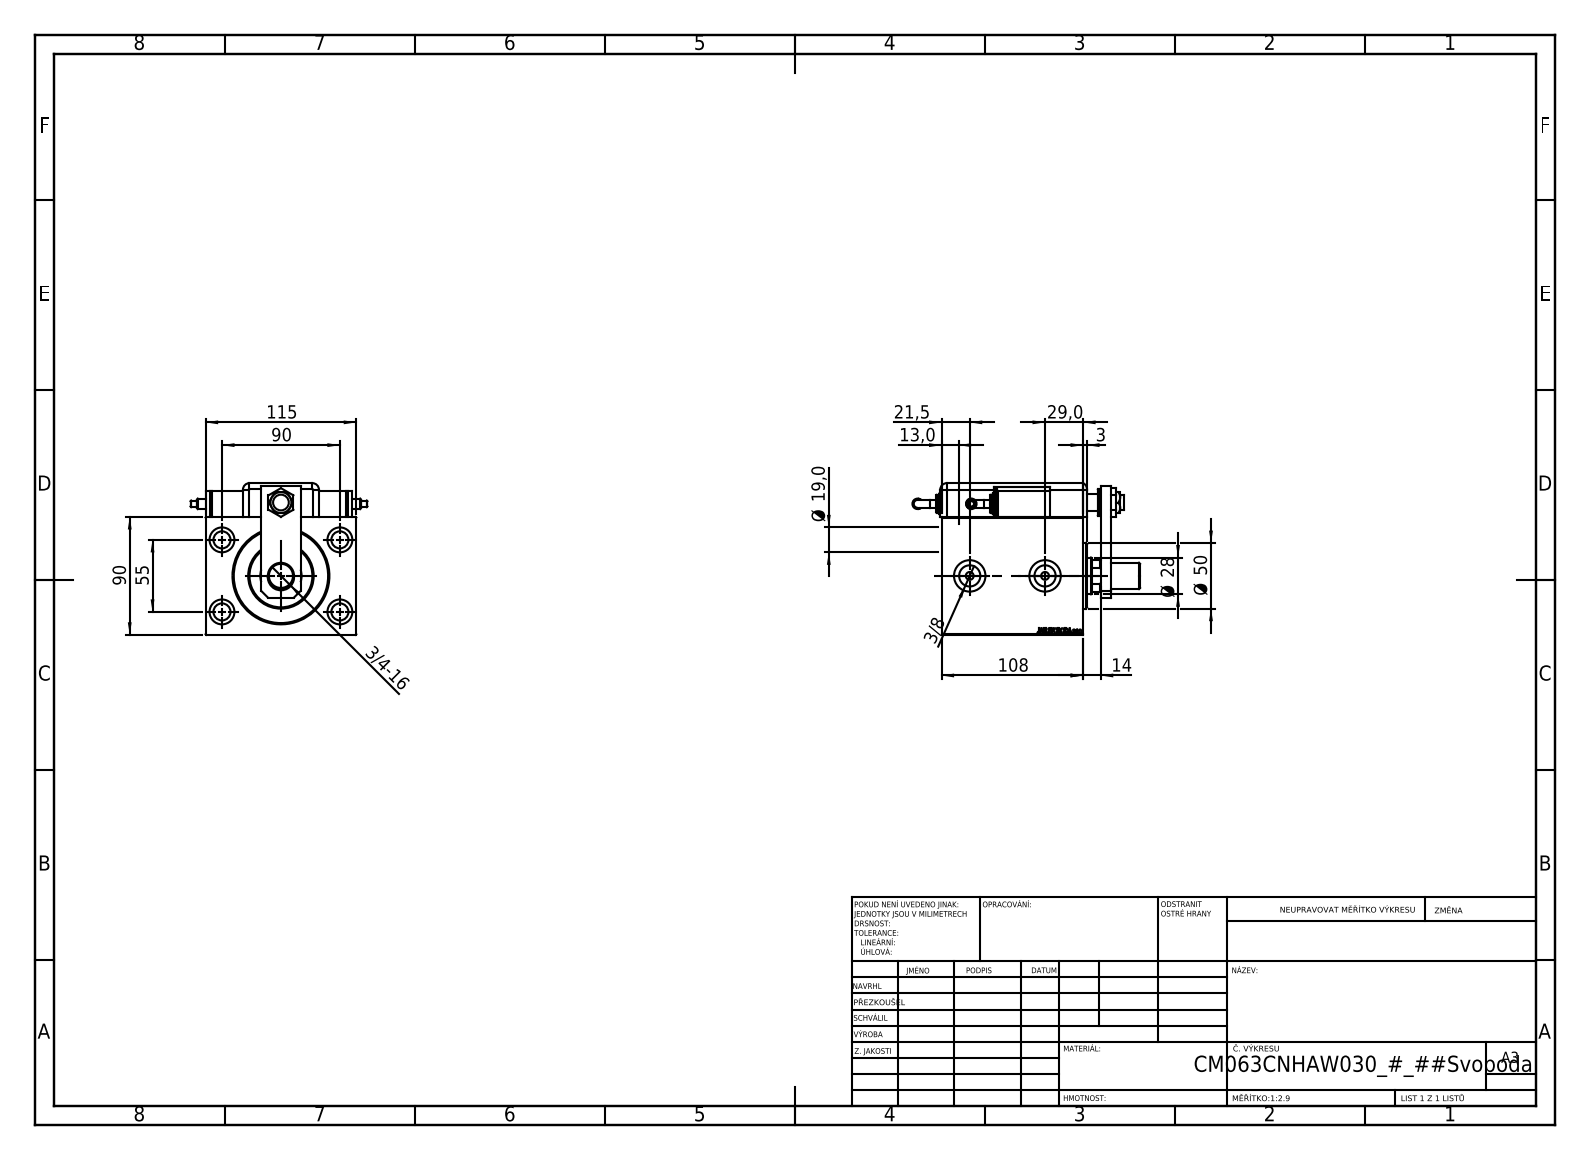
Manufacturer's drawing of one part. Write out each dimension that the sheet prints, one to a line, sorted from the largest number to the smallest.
115
108
90
90
55
Ø 50
29,0
Ø 28
21,5
Ø 19,0
14
13,0
3
3/4-16
3/8
